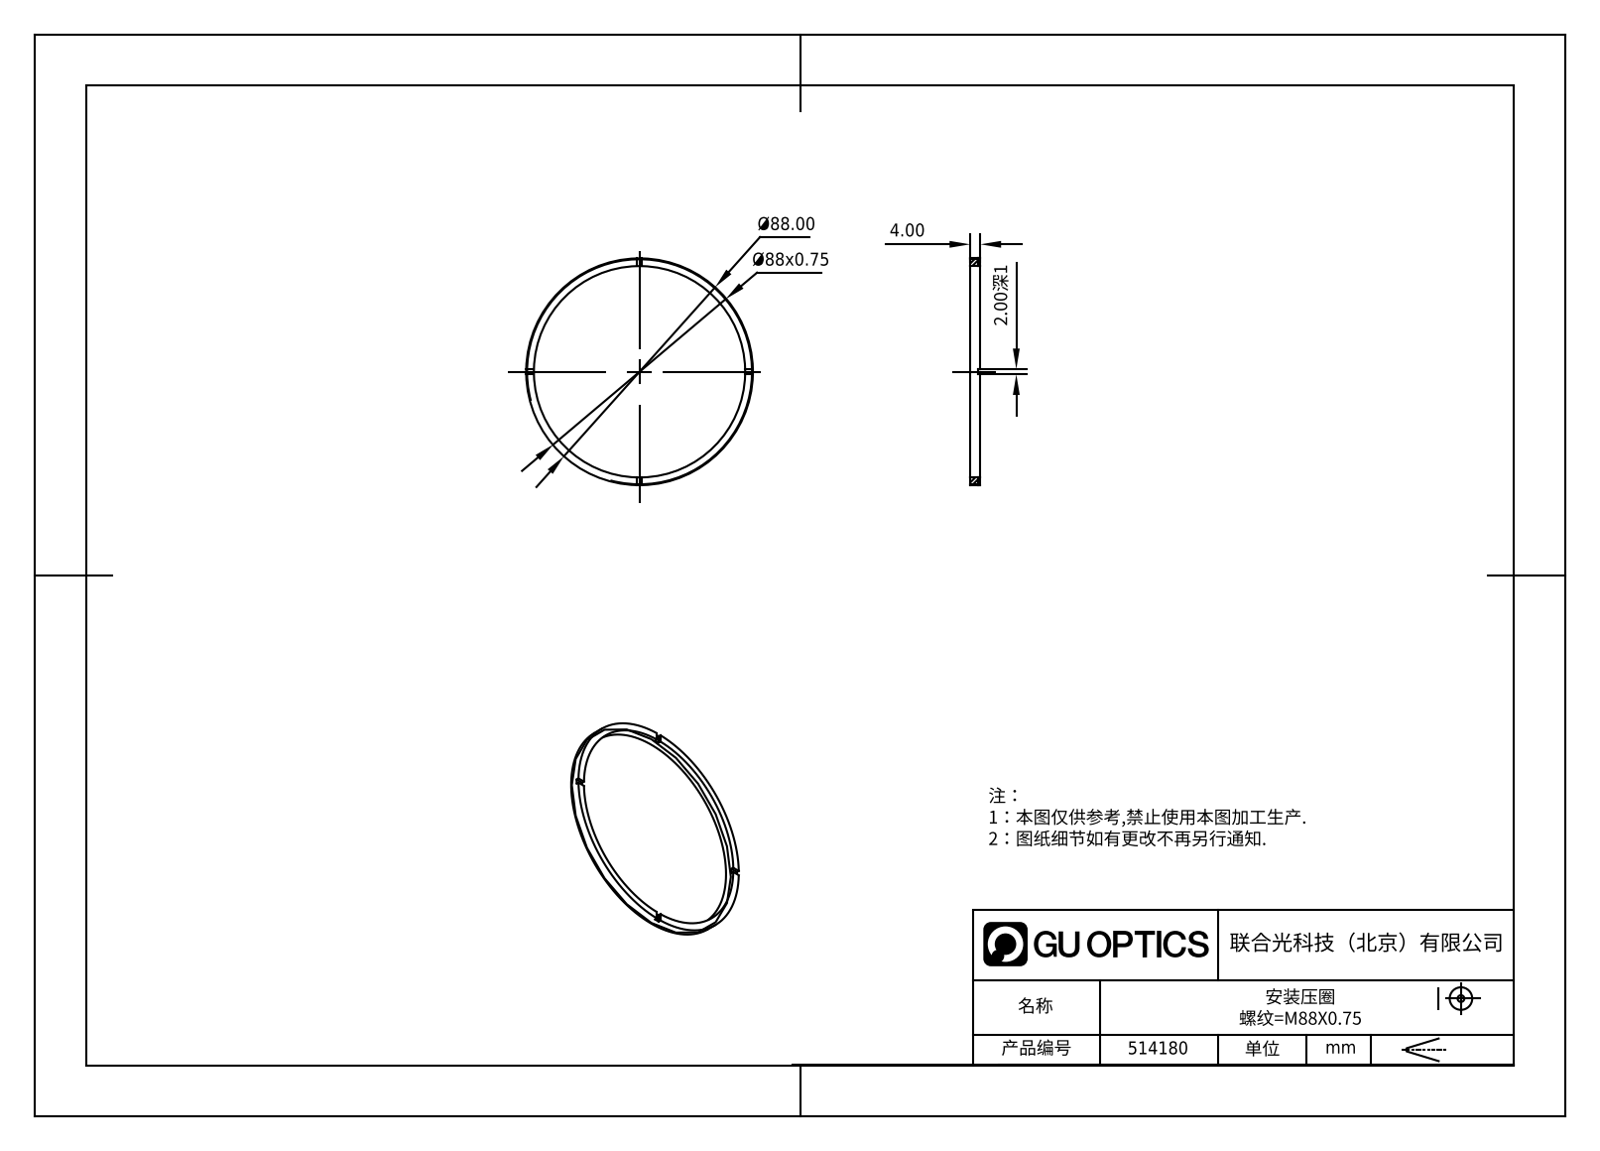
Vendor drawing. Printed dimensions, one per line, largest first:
Ø88.00
Ø88x0.75
4.00
2.00深1
